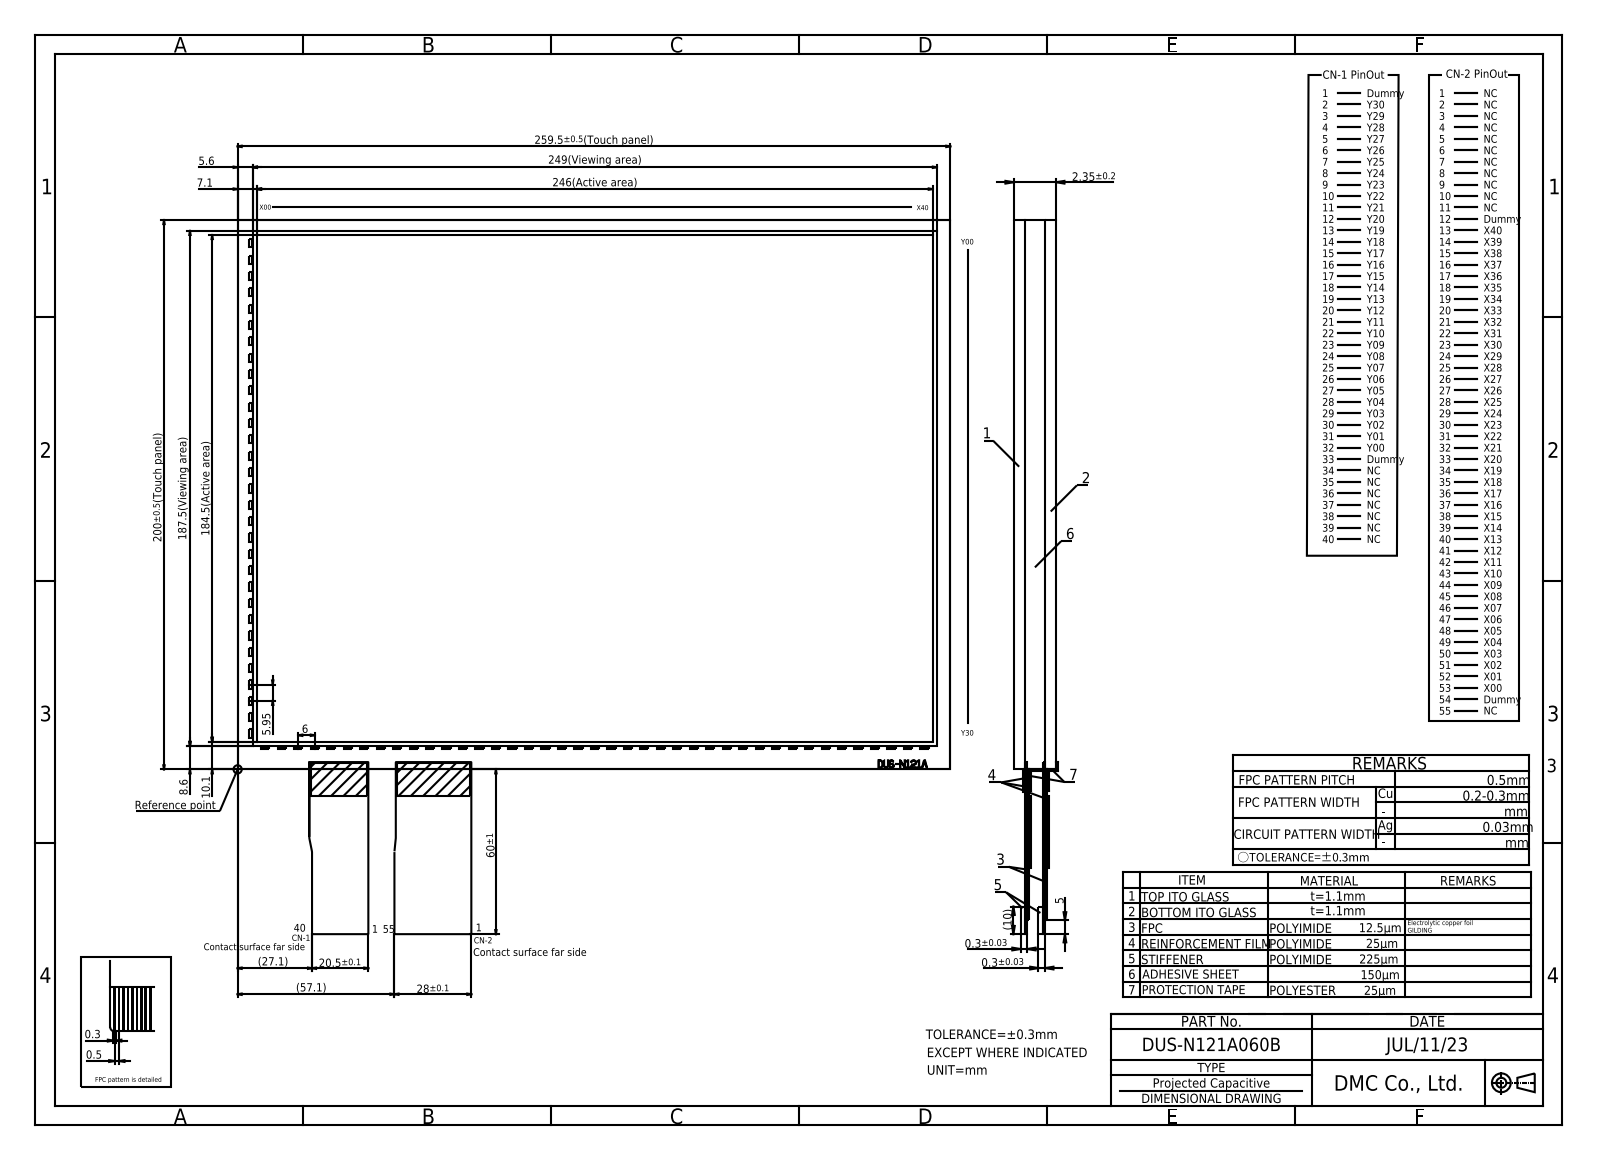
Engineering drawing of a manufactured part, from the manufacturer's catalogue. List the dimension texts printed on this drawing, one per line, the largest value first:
259.5±0.5(Touch panel)
249(Viewing area)
246(Active area)
200±0.5(Touch panel)
187.5(Viewing area)
184.5(Active area)
60±1
(57.1)
28±0.1
(27.1)
20.5±0.1
10.1
(10)
8.6
7.1
6
5.95
5.6
5
2.35±0.2
0.5
0.3
0.3±0.03
0.3±0.03
